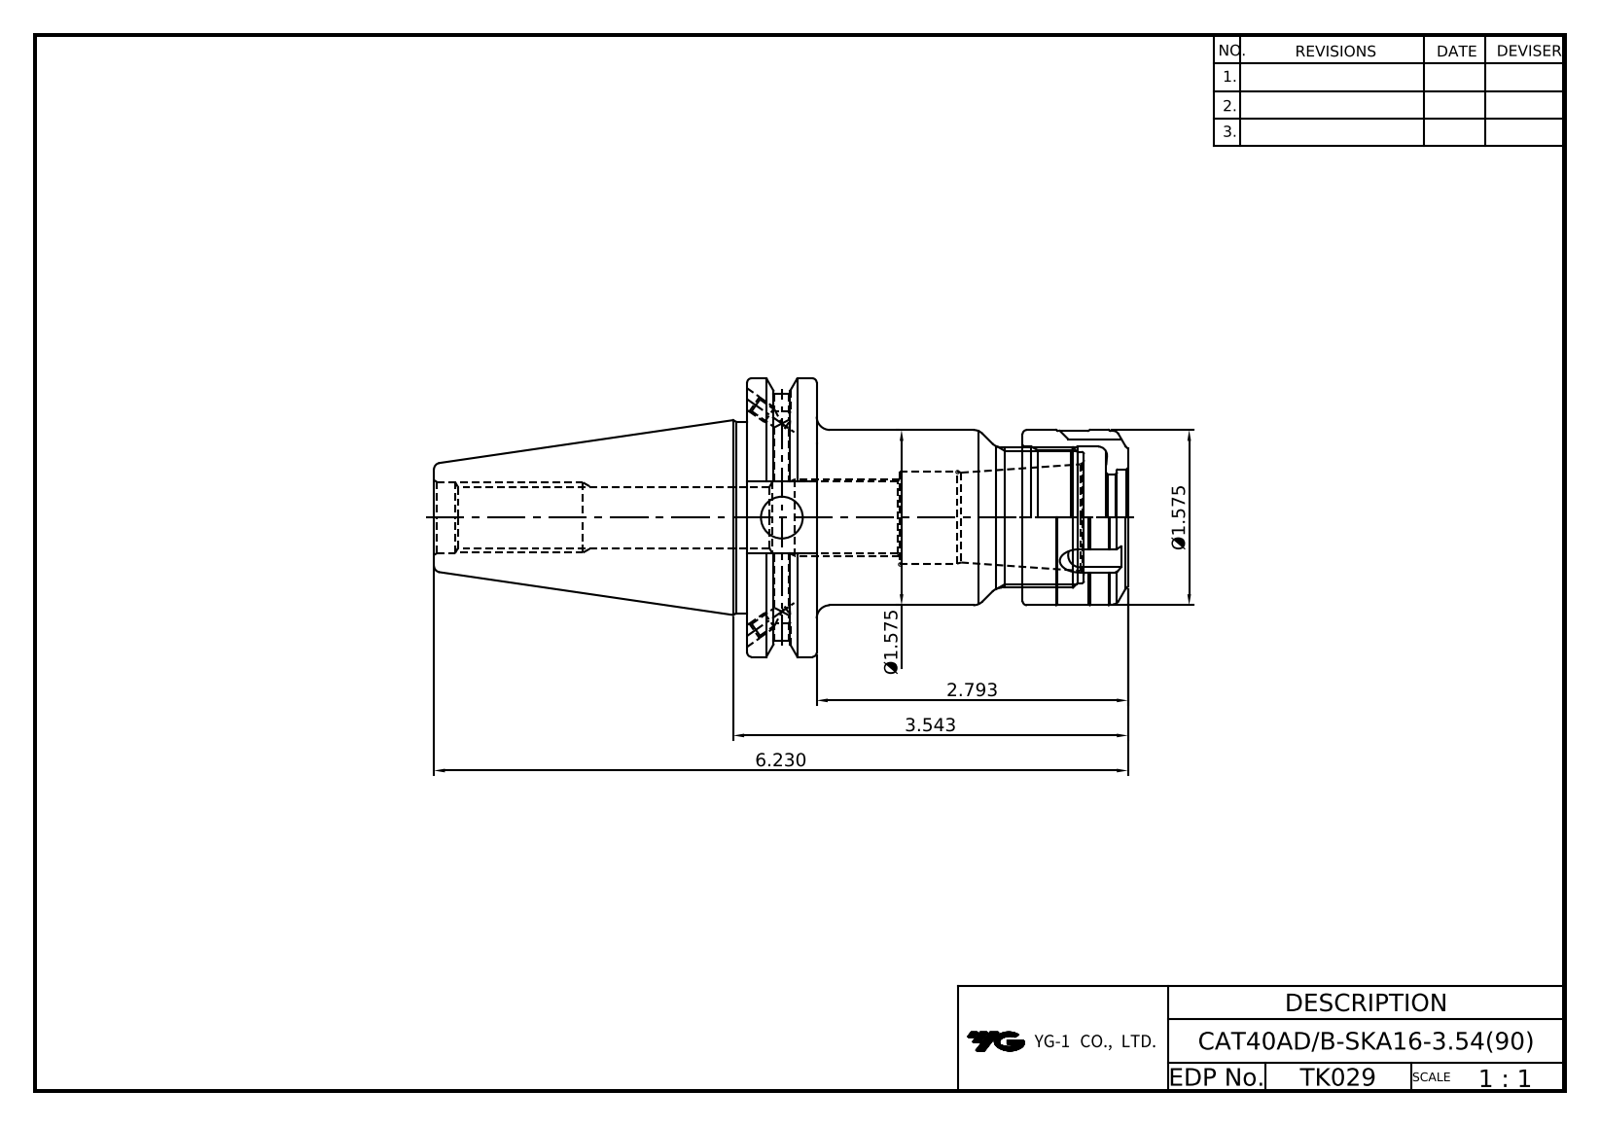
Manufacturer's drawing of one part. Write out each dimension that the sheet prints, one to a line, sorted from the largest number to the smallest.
6.230
3.543
2.793
Ø1.575
Ø1.575
